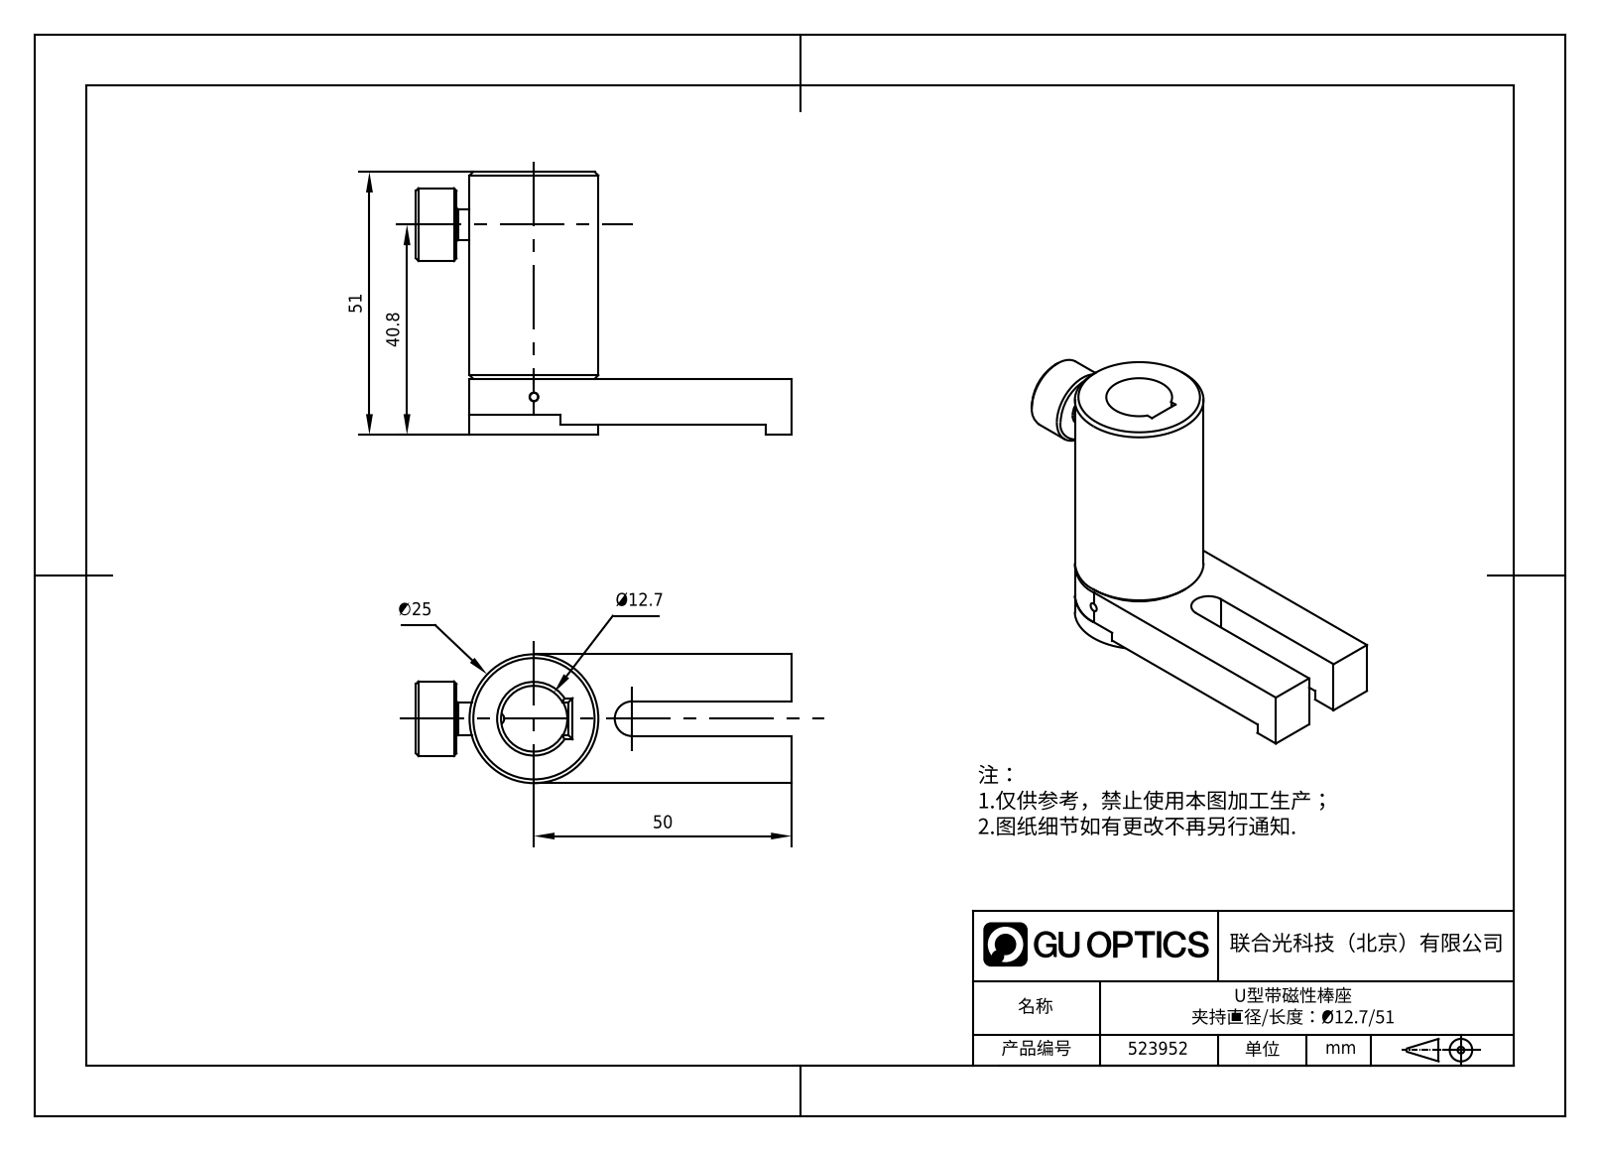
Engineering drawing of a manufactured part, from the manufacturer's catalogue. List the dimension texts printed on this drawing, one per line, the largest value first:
51
50
40.8
∅25
Ø12.7
